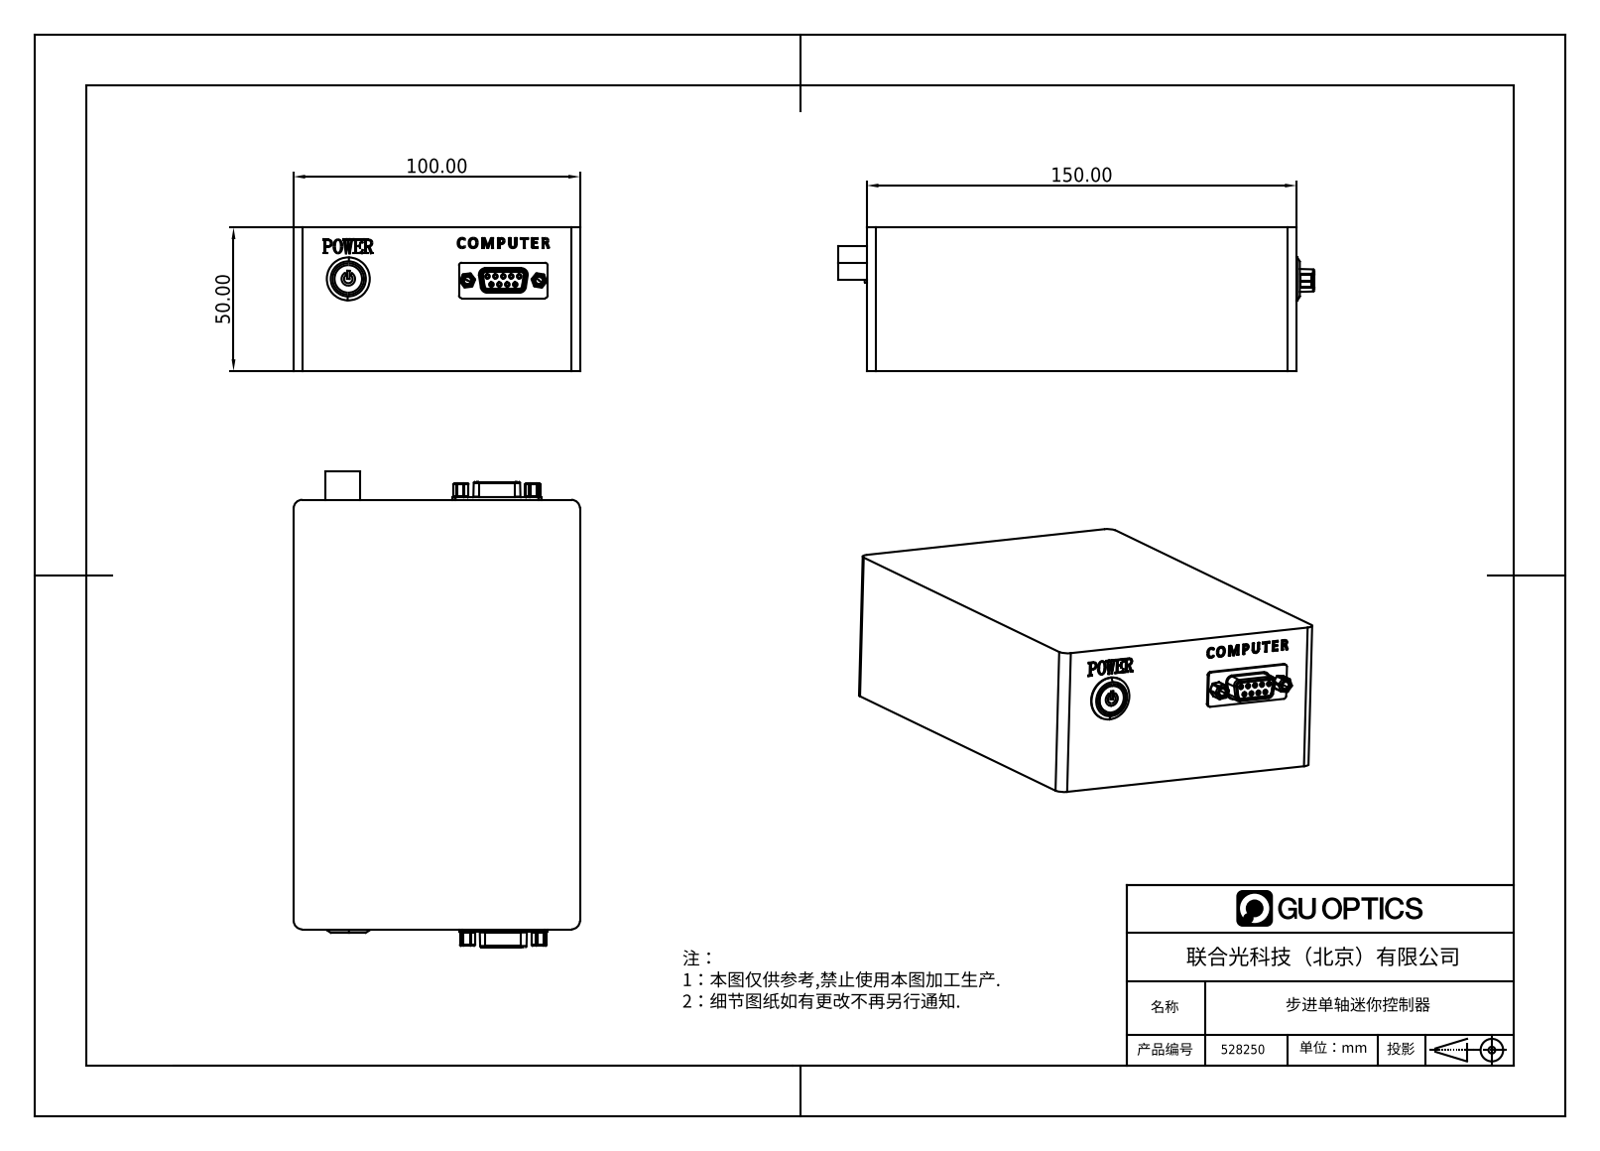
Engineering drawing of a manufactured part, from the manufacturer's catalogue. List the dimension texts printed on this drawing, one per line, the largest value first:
150.00
100.00
50.00
